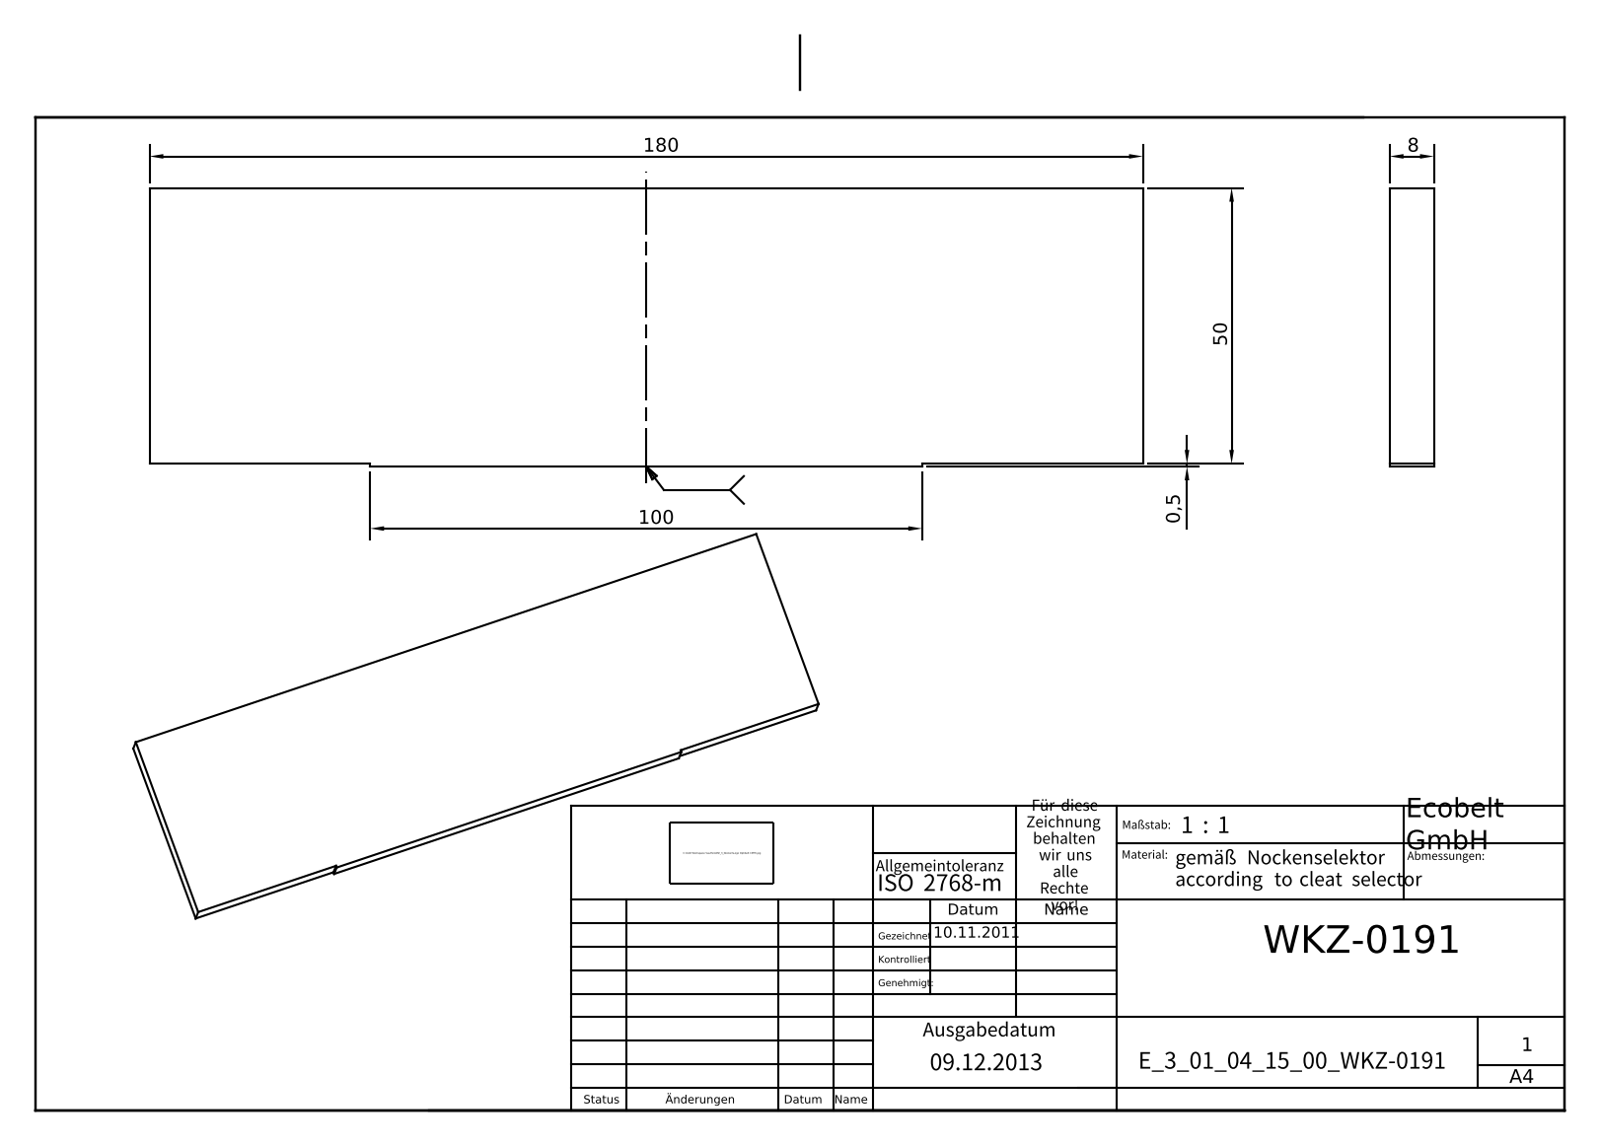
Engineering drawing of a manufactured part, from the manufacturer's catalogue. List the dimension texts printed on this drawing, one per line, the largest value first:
180
100
50
8
0,5
